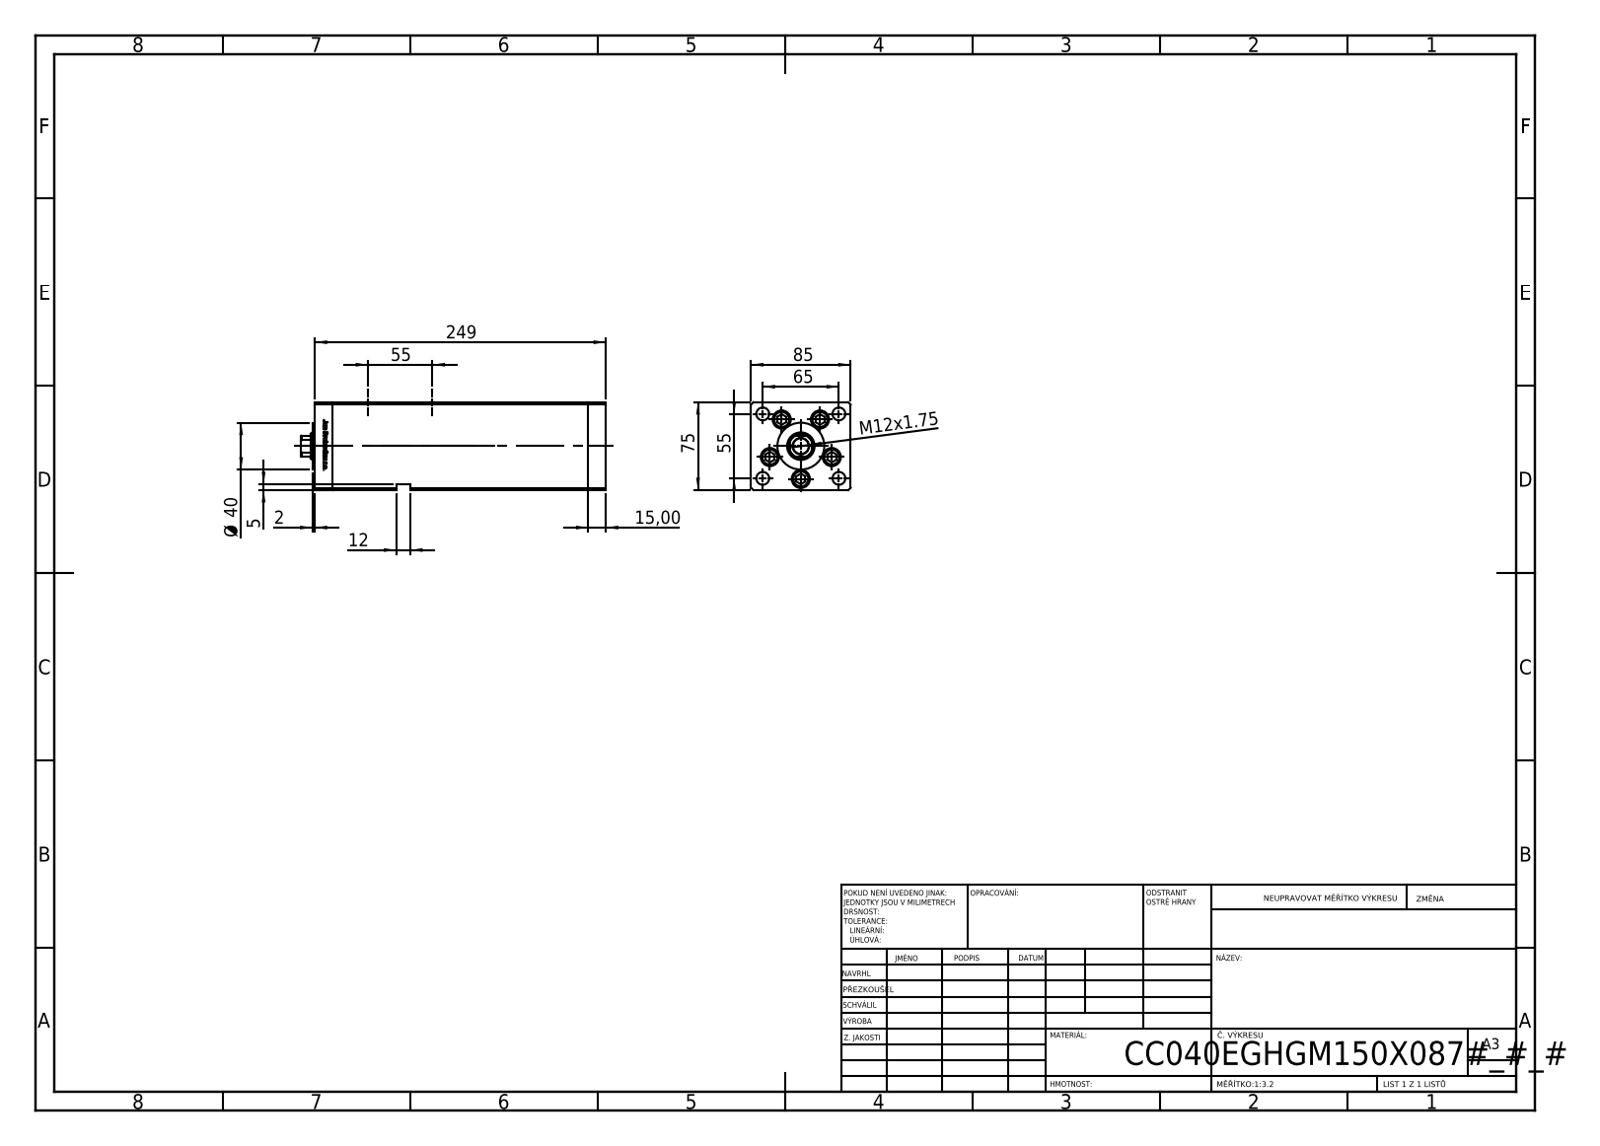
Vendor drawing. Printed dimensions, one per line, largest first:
249
85
75
65
55
55
Ø 40
15,00
12
M12x1.75
5
2
